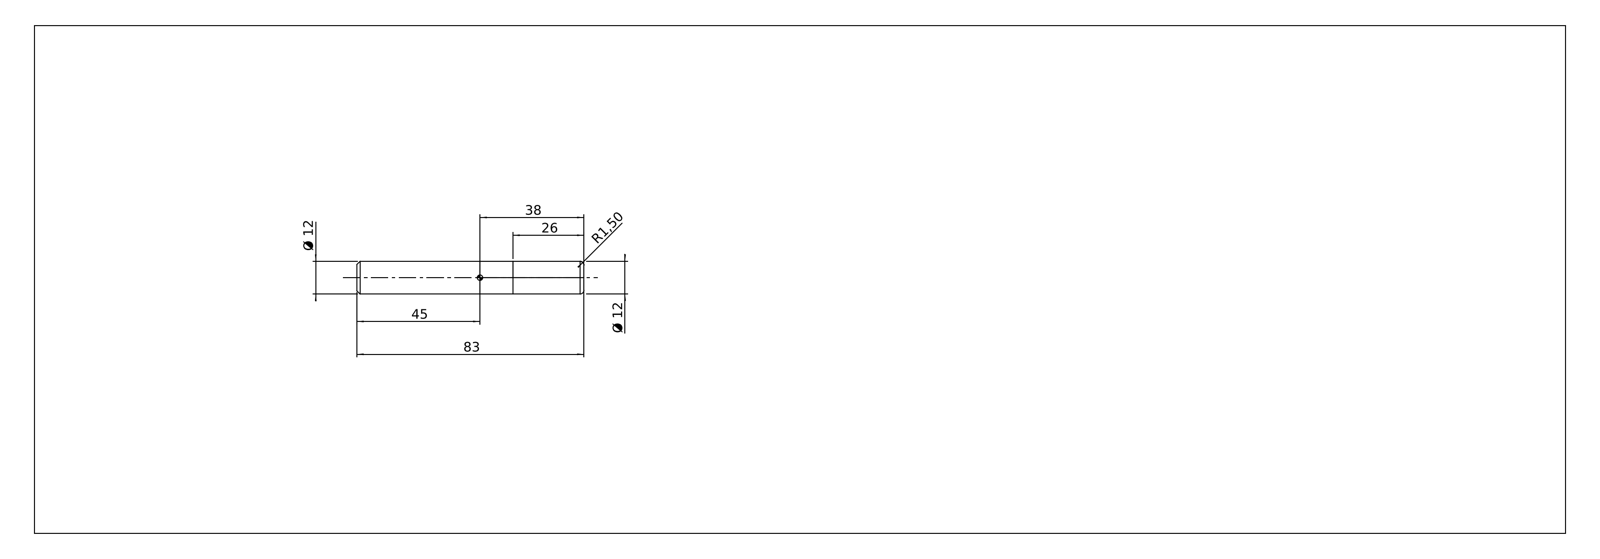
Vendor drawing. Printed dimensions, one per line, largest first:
83
45
38
26
Ø 12
Ø 12
R1,50
